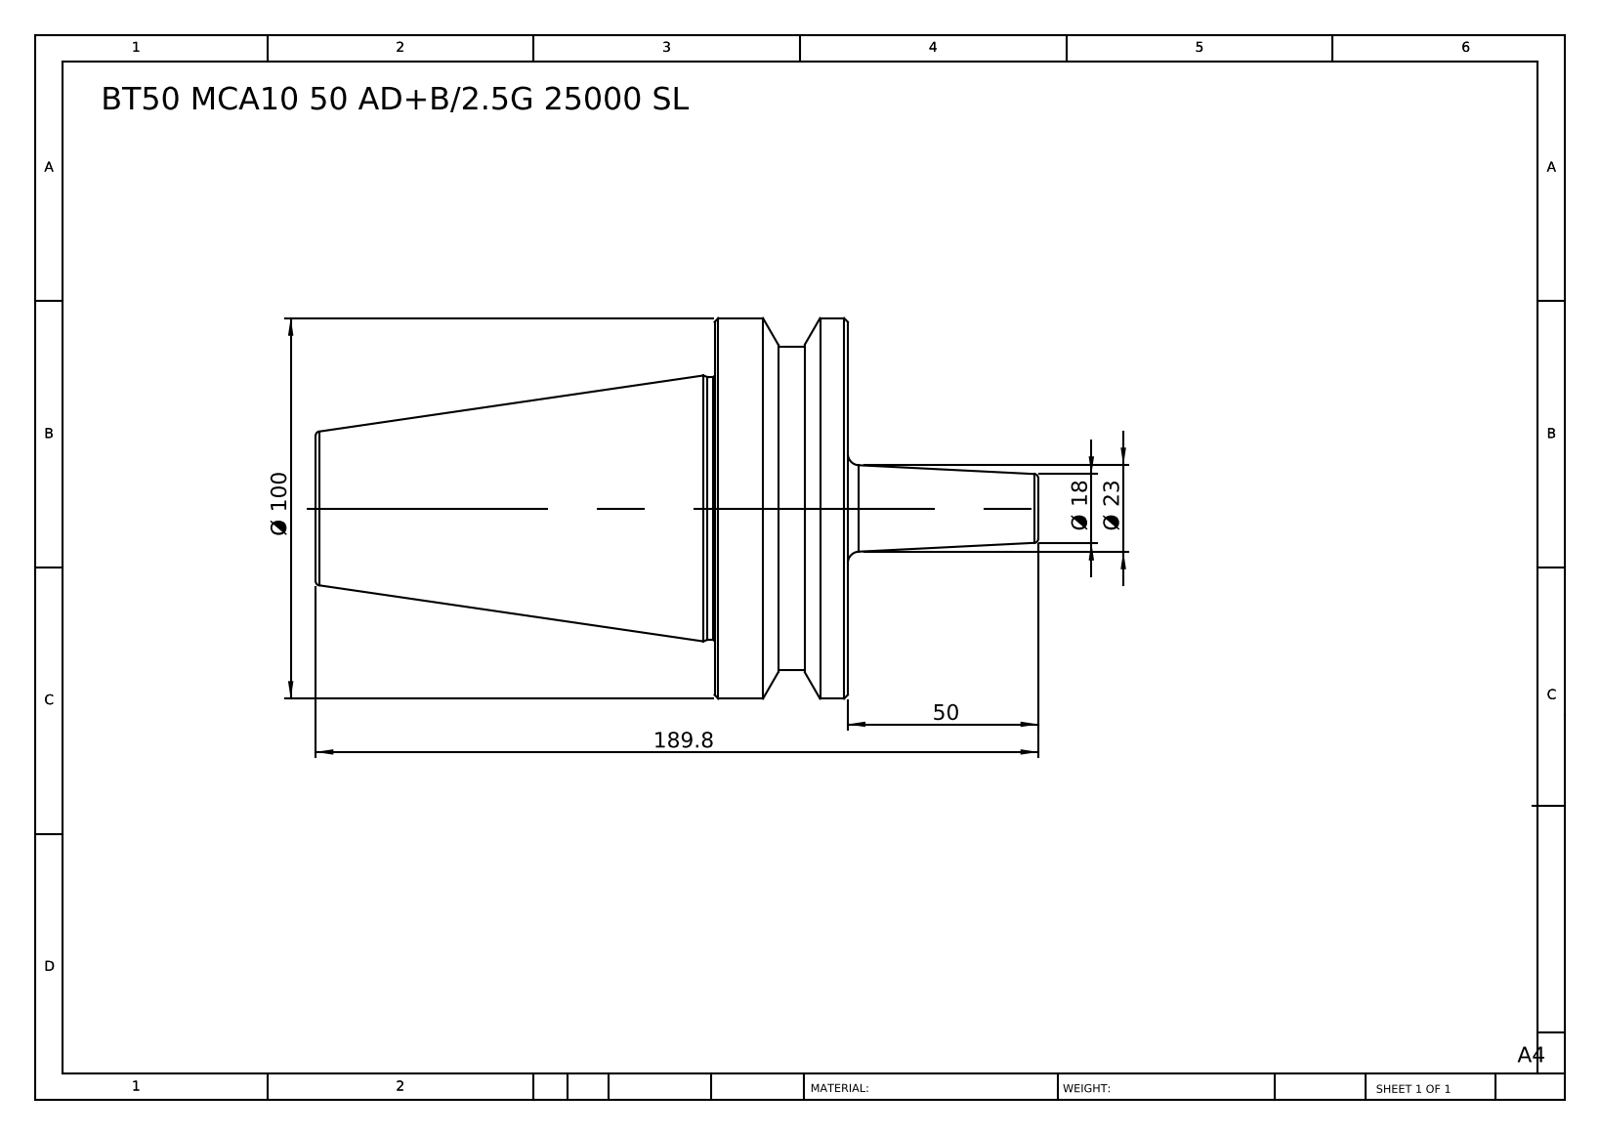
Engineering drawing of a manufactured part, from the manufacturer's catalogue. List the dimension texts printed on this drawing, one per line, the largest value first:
189.8
Ø 100
50
Ø 23
Ø 18
